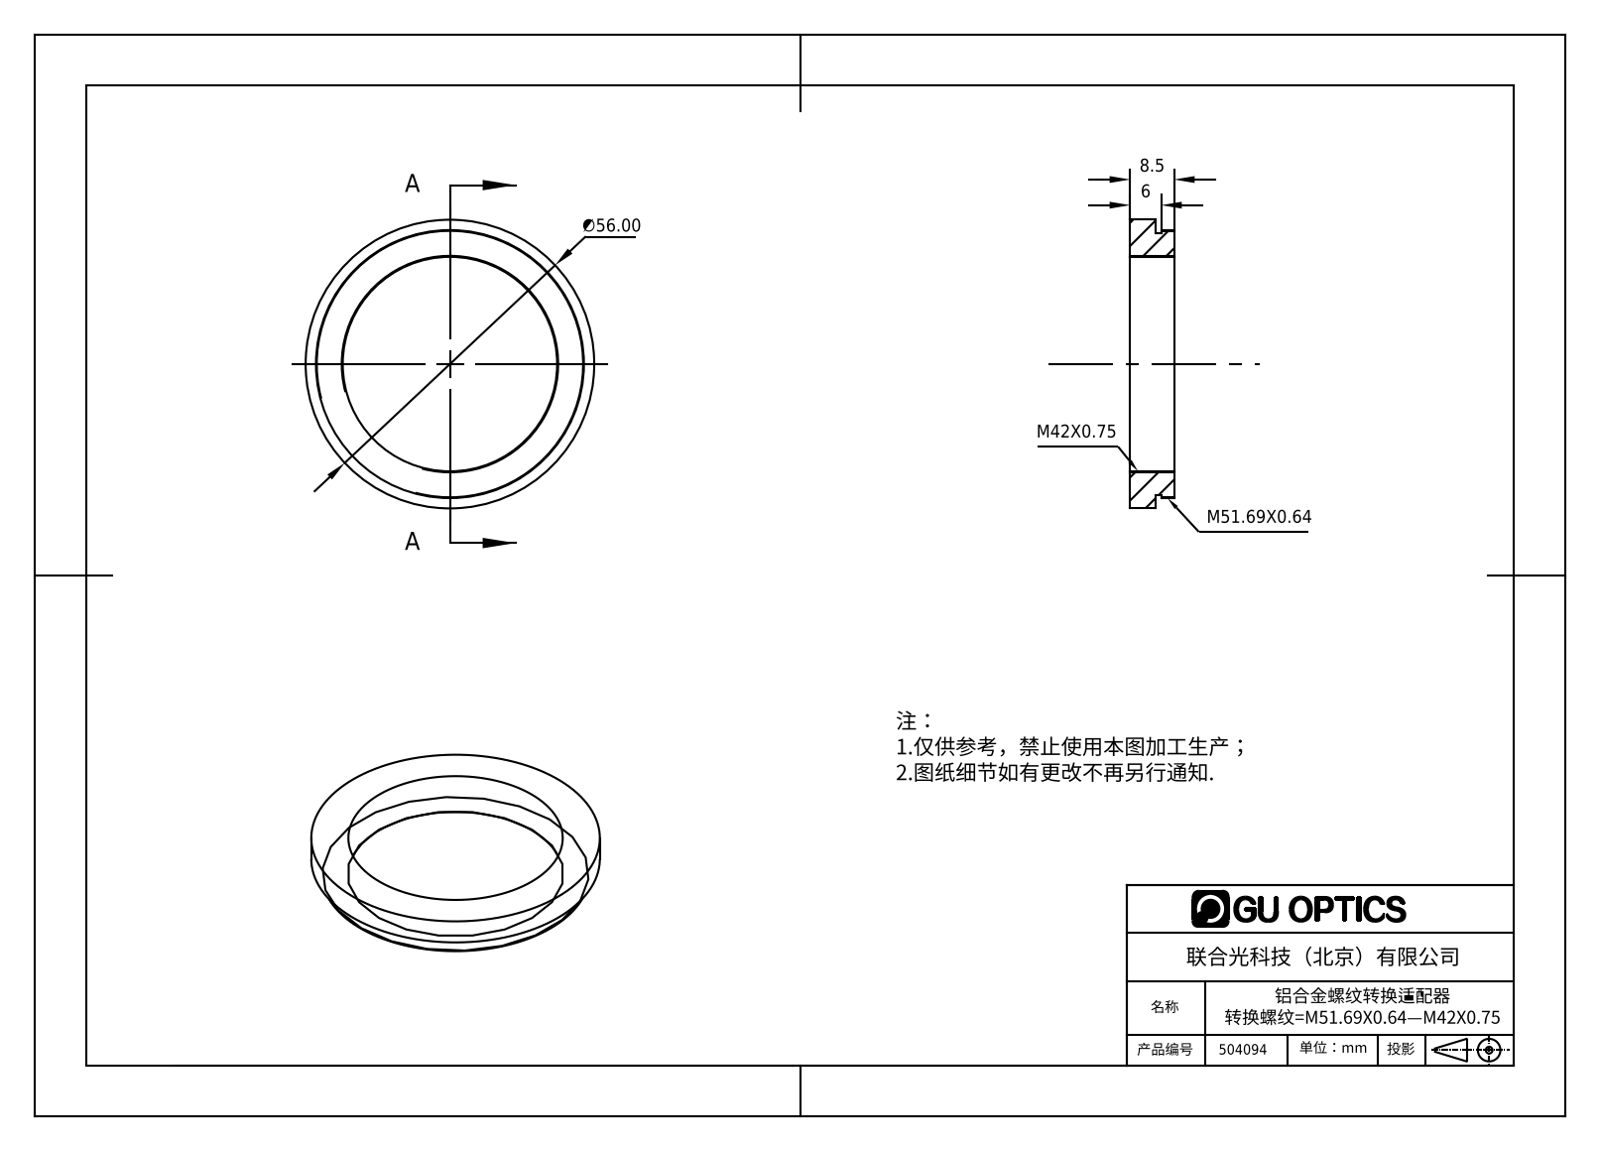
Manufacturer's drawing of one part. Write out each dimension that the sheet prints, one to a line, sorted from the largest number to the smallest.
∅56.00
8.5
6
